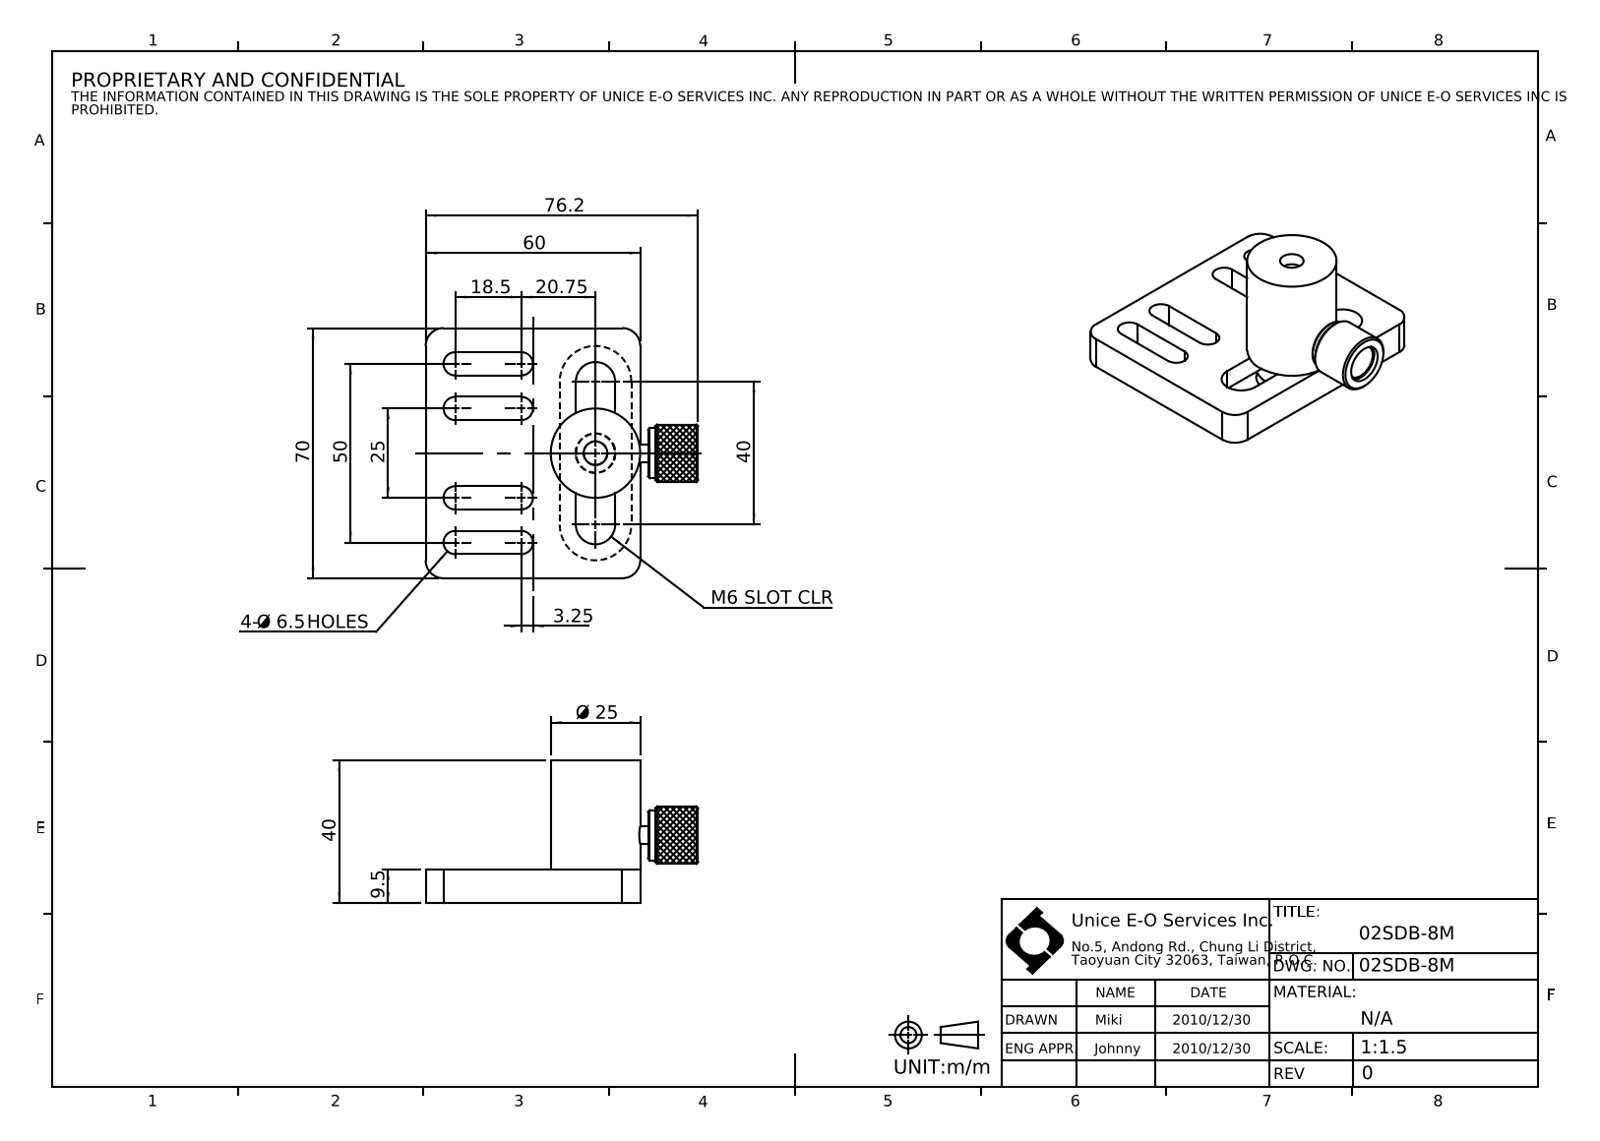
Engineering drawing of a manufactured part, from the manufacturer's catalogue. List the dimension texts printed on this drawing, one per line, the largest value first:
76.2
70
60
50
40
40
Ø 25
25
20.75
18.5
9.5
4- Ø 6.5 HOLES
M6 SLOT CLR
3.25
